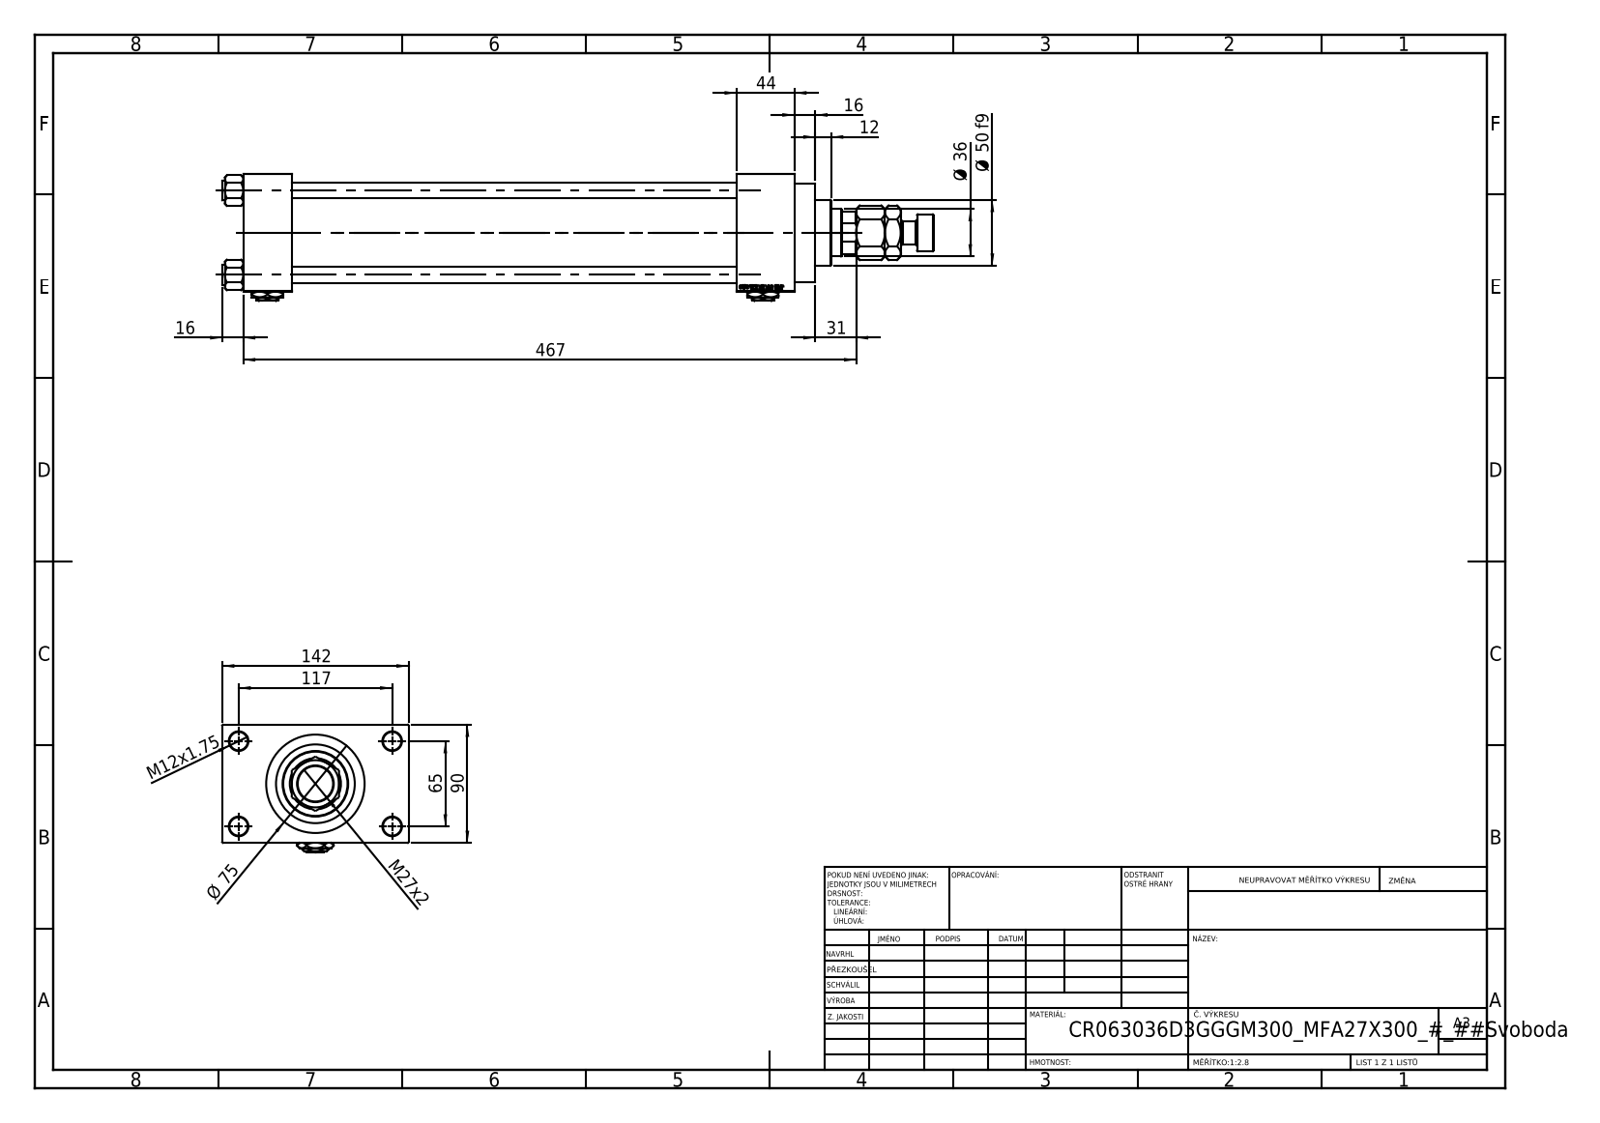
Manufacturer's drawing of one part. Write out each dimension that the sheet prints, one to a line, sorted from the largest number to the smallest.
467
142
117
90
Ø 75
65
Ø 50 f9
44
Ø 36
31
M27x2
16
16
12
M12x1.75
